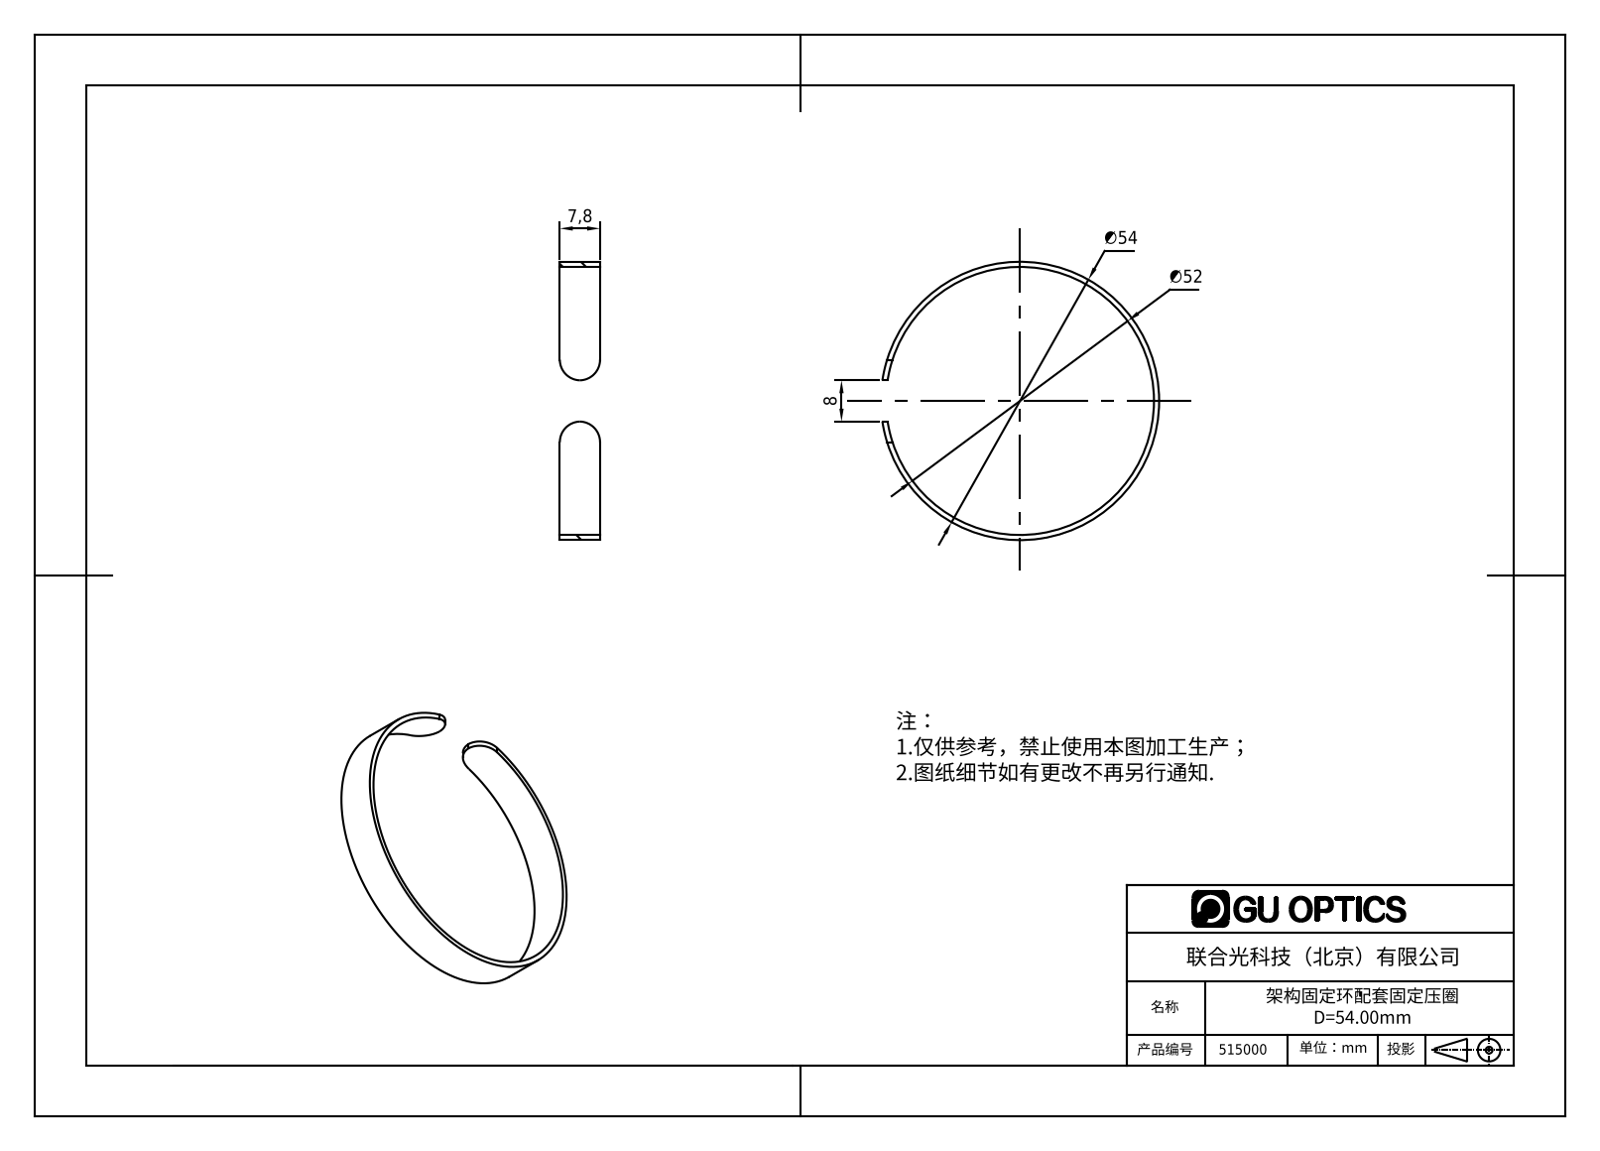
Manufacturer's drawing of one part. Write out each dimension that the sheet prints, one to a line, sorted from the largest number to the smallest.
∅54
∅52
8
7,8
